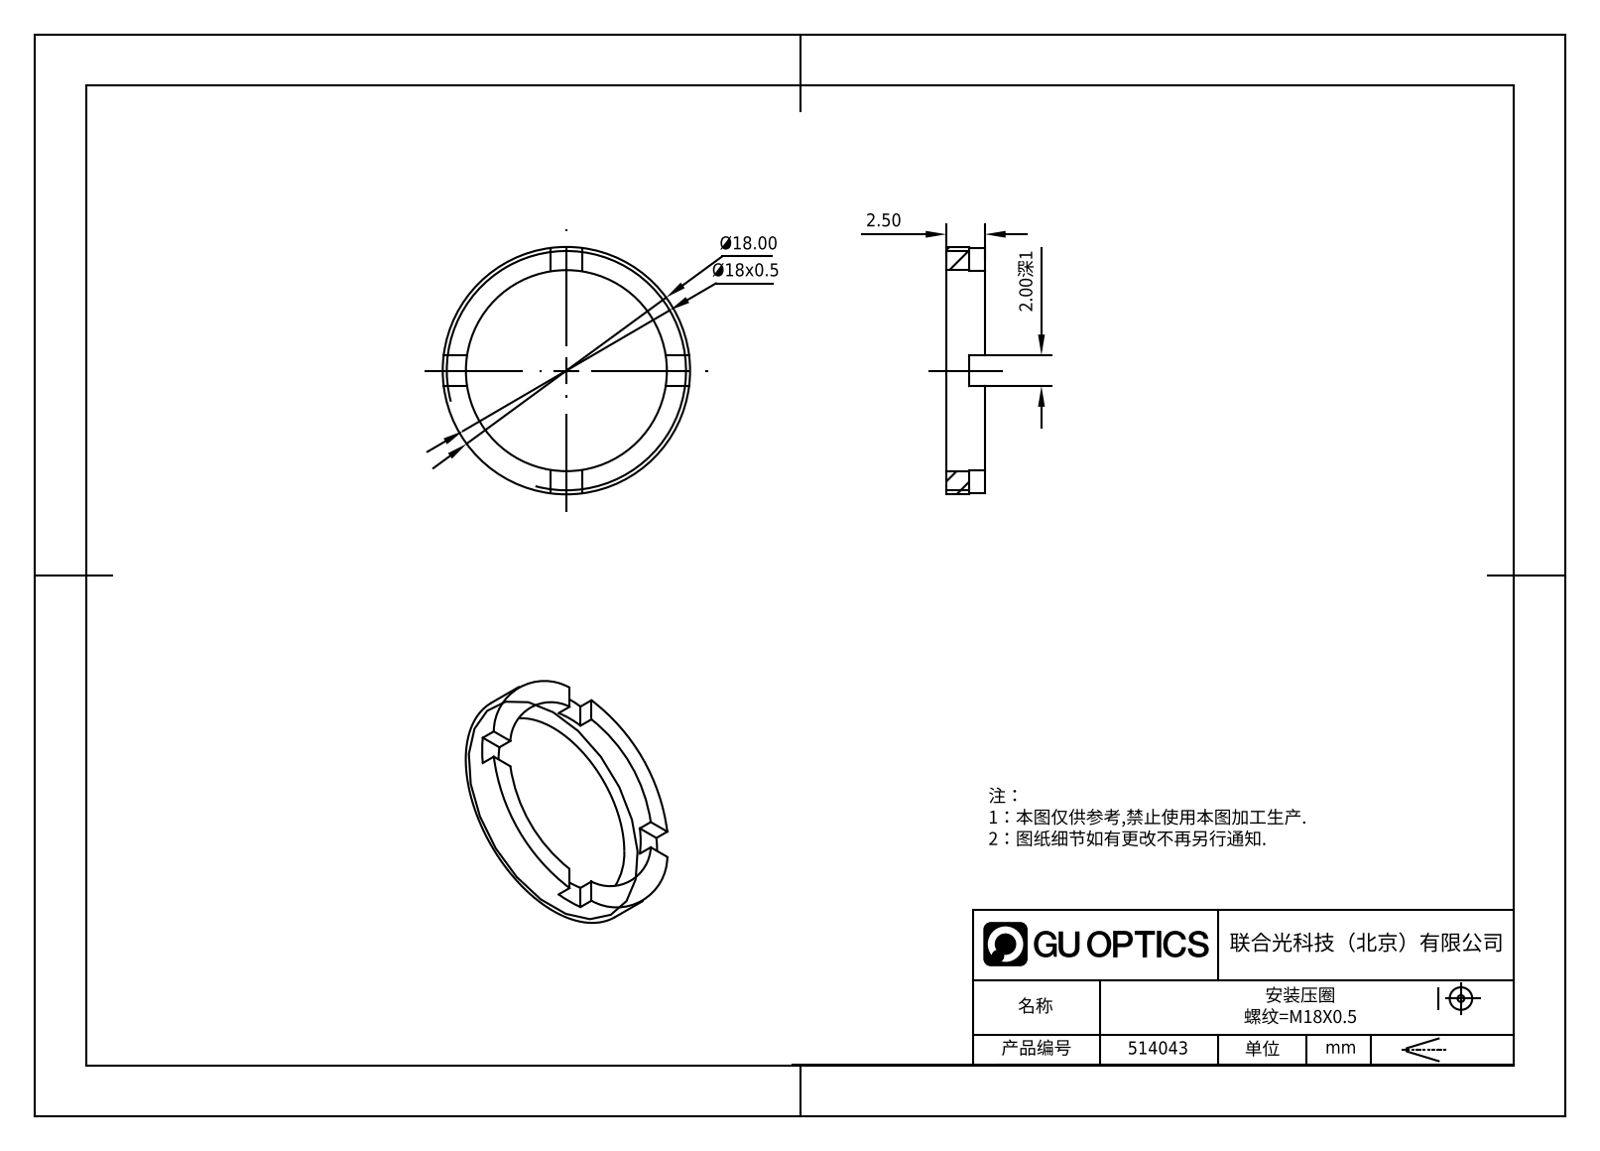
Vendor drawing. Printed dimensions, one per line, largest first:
Ø18.00
Ø18x0.5
2.50
2.00深1
